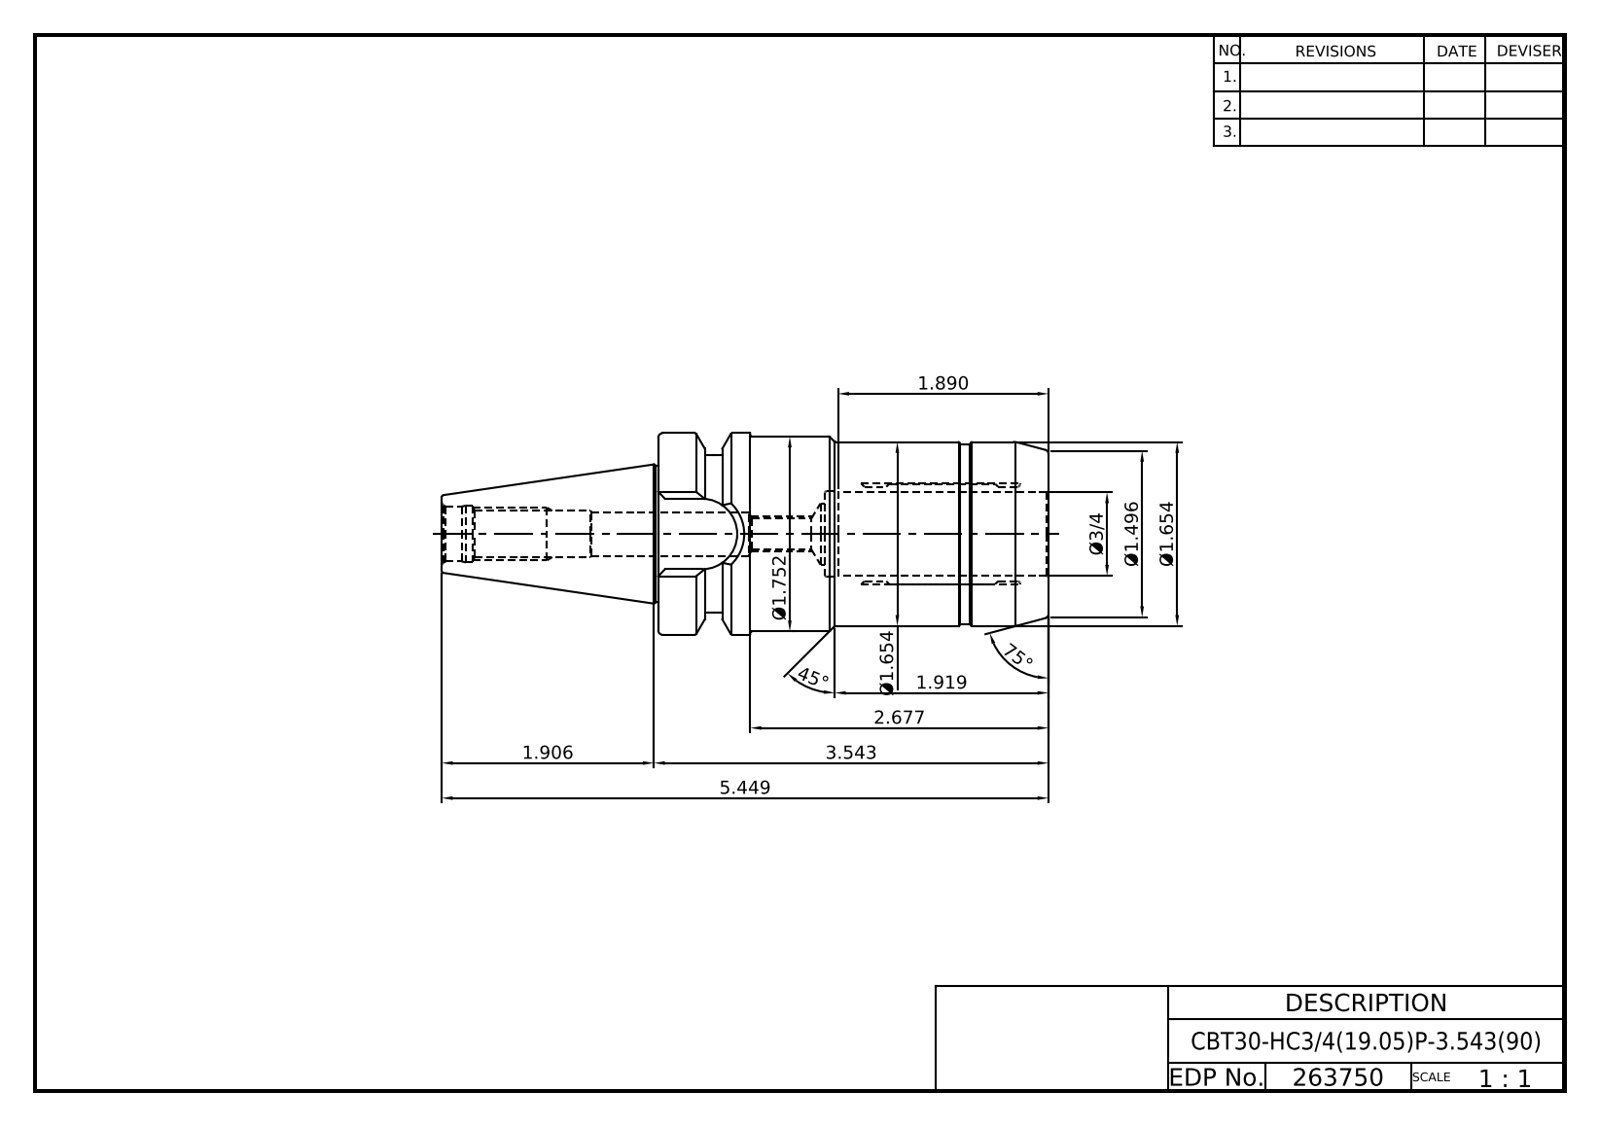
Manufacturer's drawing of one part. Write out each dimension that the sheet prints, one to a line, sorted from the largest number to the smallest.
75°
45°
5.449
3.543
2.677
1.919
1.906
1.890
Ø1.752
Ø1.654
Ø1.654
Ø1.496
Ø3/4
